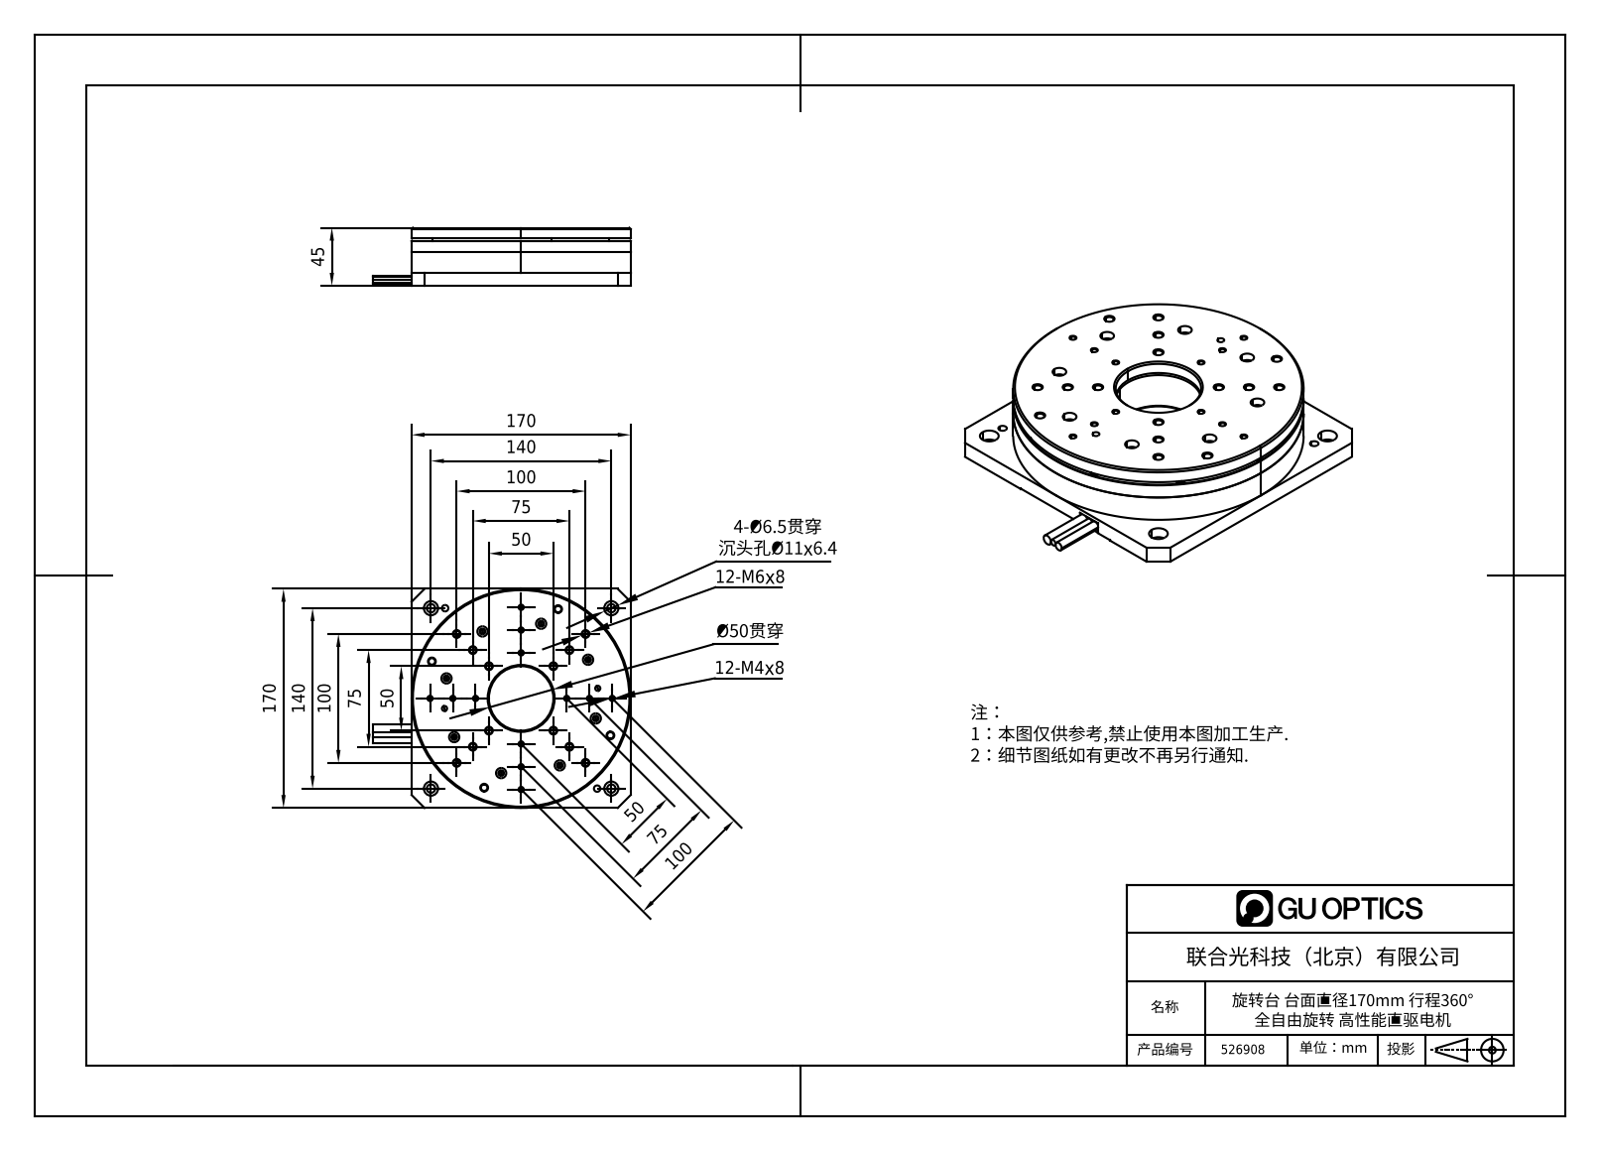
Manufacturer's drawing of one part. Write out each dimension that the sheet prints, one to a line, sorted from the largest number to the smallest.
170
170
140
140
100
100
100
75
75
75
50
50
50
Ø50贯穿
45
4-Ø6.5贯穿 沉头孔Ø11x6.4
12-M6x8
12-M4x8
